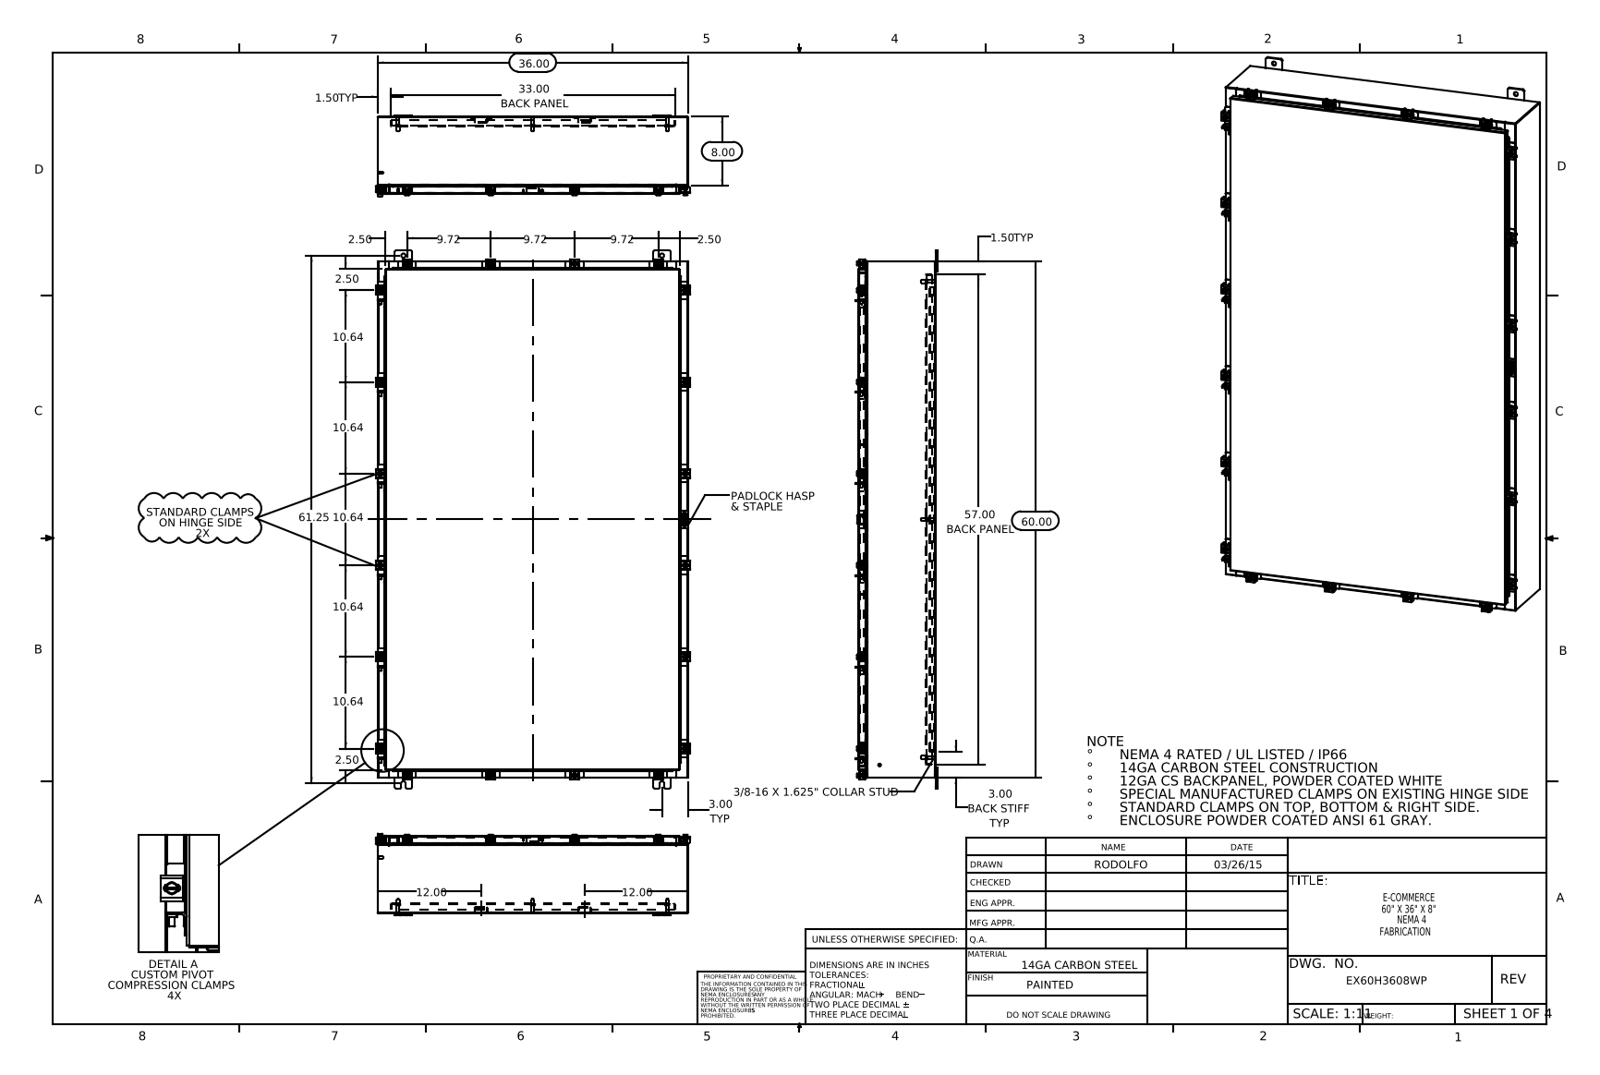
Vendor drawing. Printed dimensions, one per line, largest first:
61.25
60.00
57.00 BACK PANEL
36.00
33.00 BACK PANEL
12.00
12.00
10.64
10.64
10.64
10.64
10.64
9.72
9.72
9.72
8.00
3.00 TYP
3.00 BACK STIFF TYP
2.50
2.50
2.50
2.50
1.50 TYP
1.50 TYP
